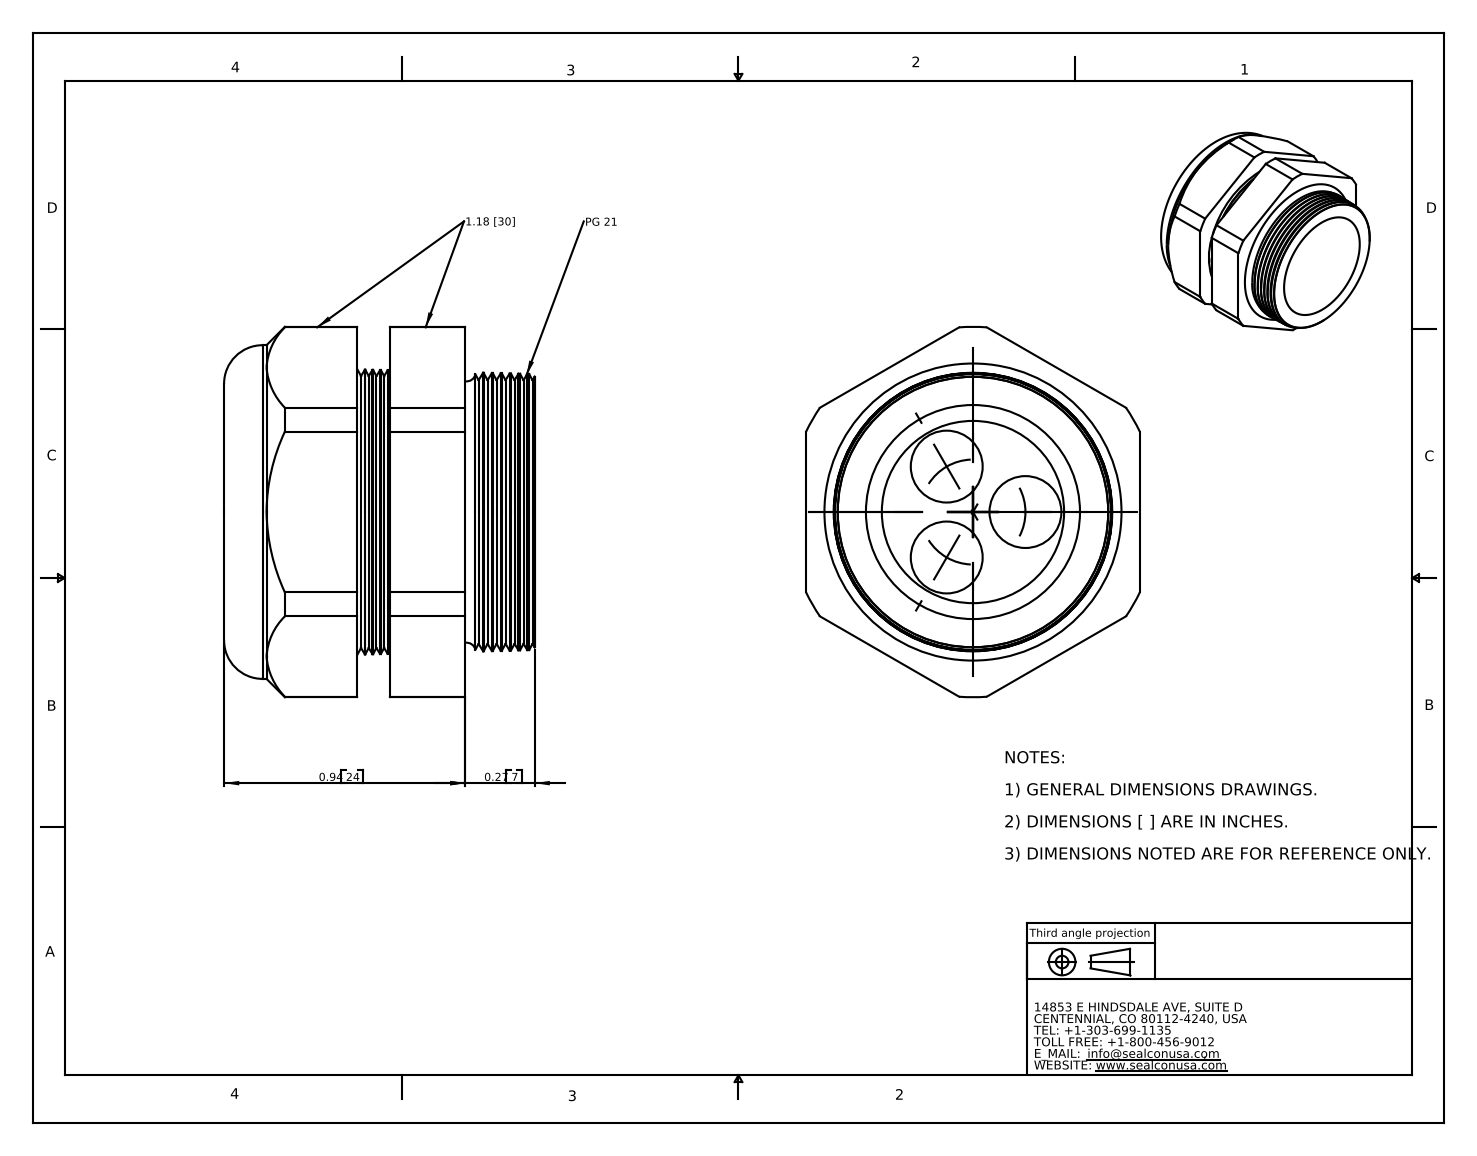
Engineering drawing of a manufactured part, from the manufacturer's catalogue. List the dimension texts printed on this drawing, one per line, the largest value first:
0.94 24
0.27 7
